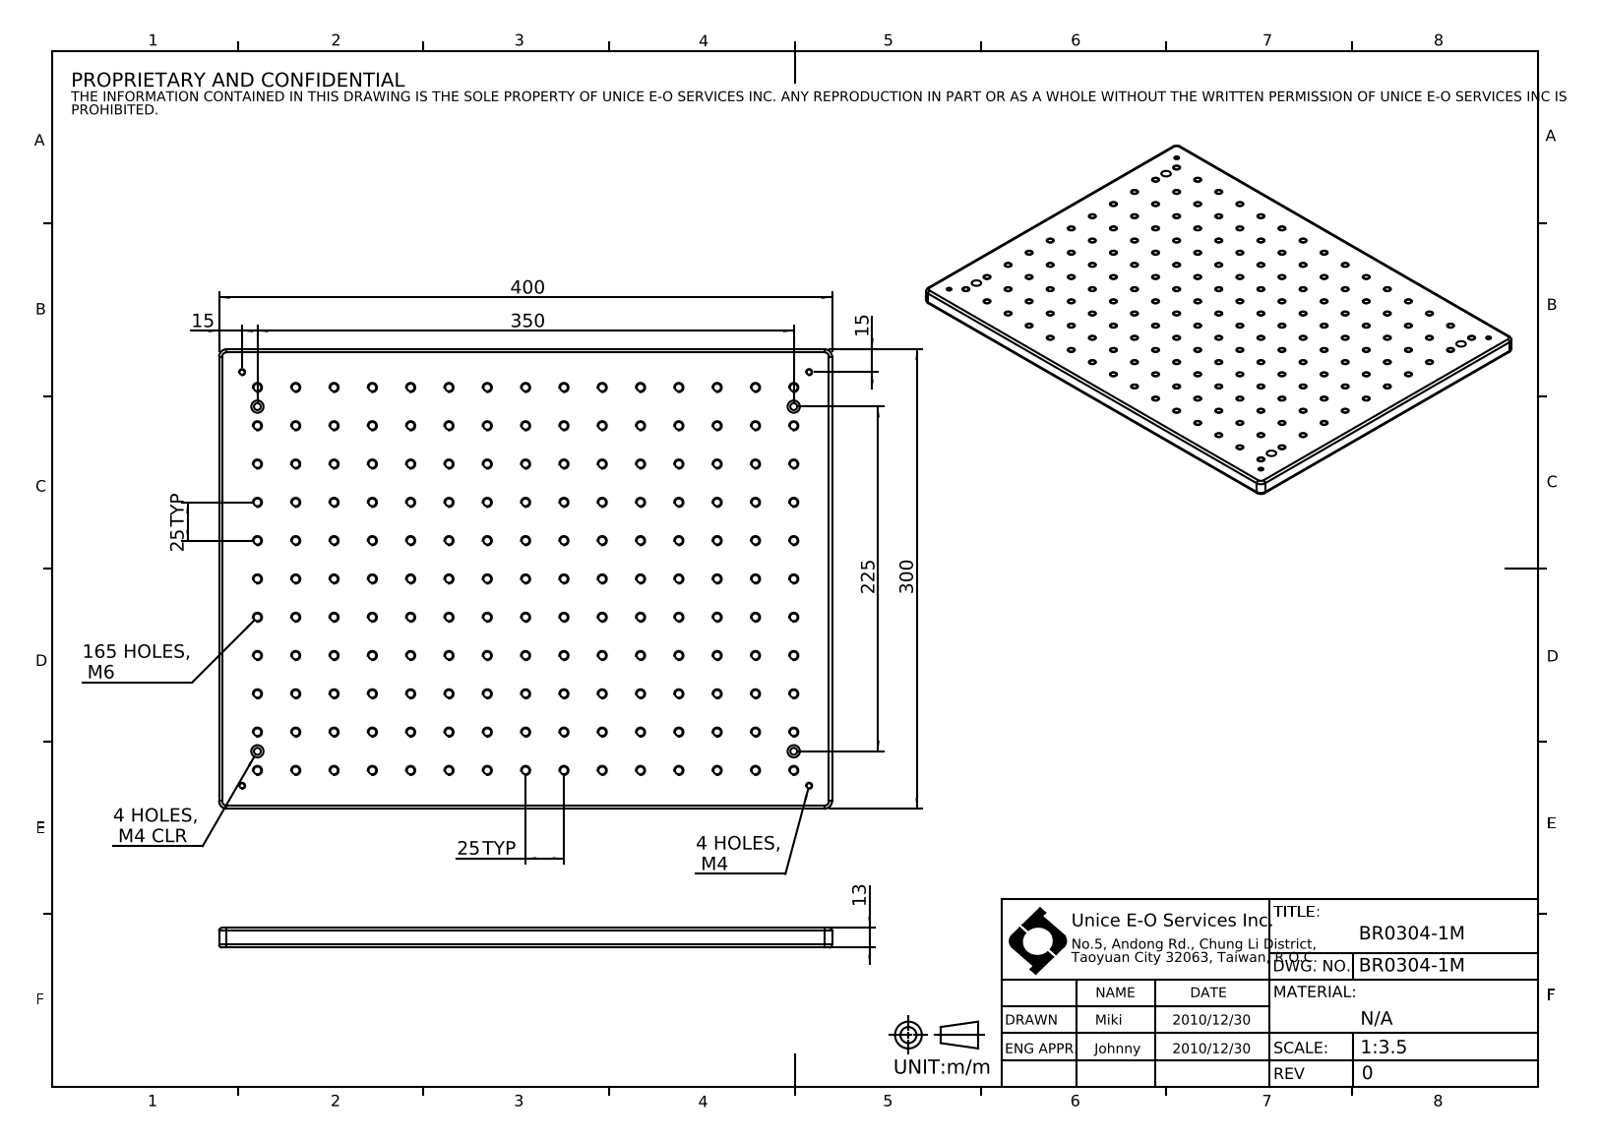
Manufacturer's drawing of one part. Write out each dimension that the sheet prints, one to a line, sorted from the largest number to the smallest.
400
350
300
225
165 HOLES, M6
25 TYP
25 TYP
15
15
13
4 HOLES, M4
4 HOLES, M4 CLR
